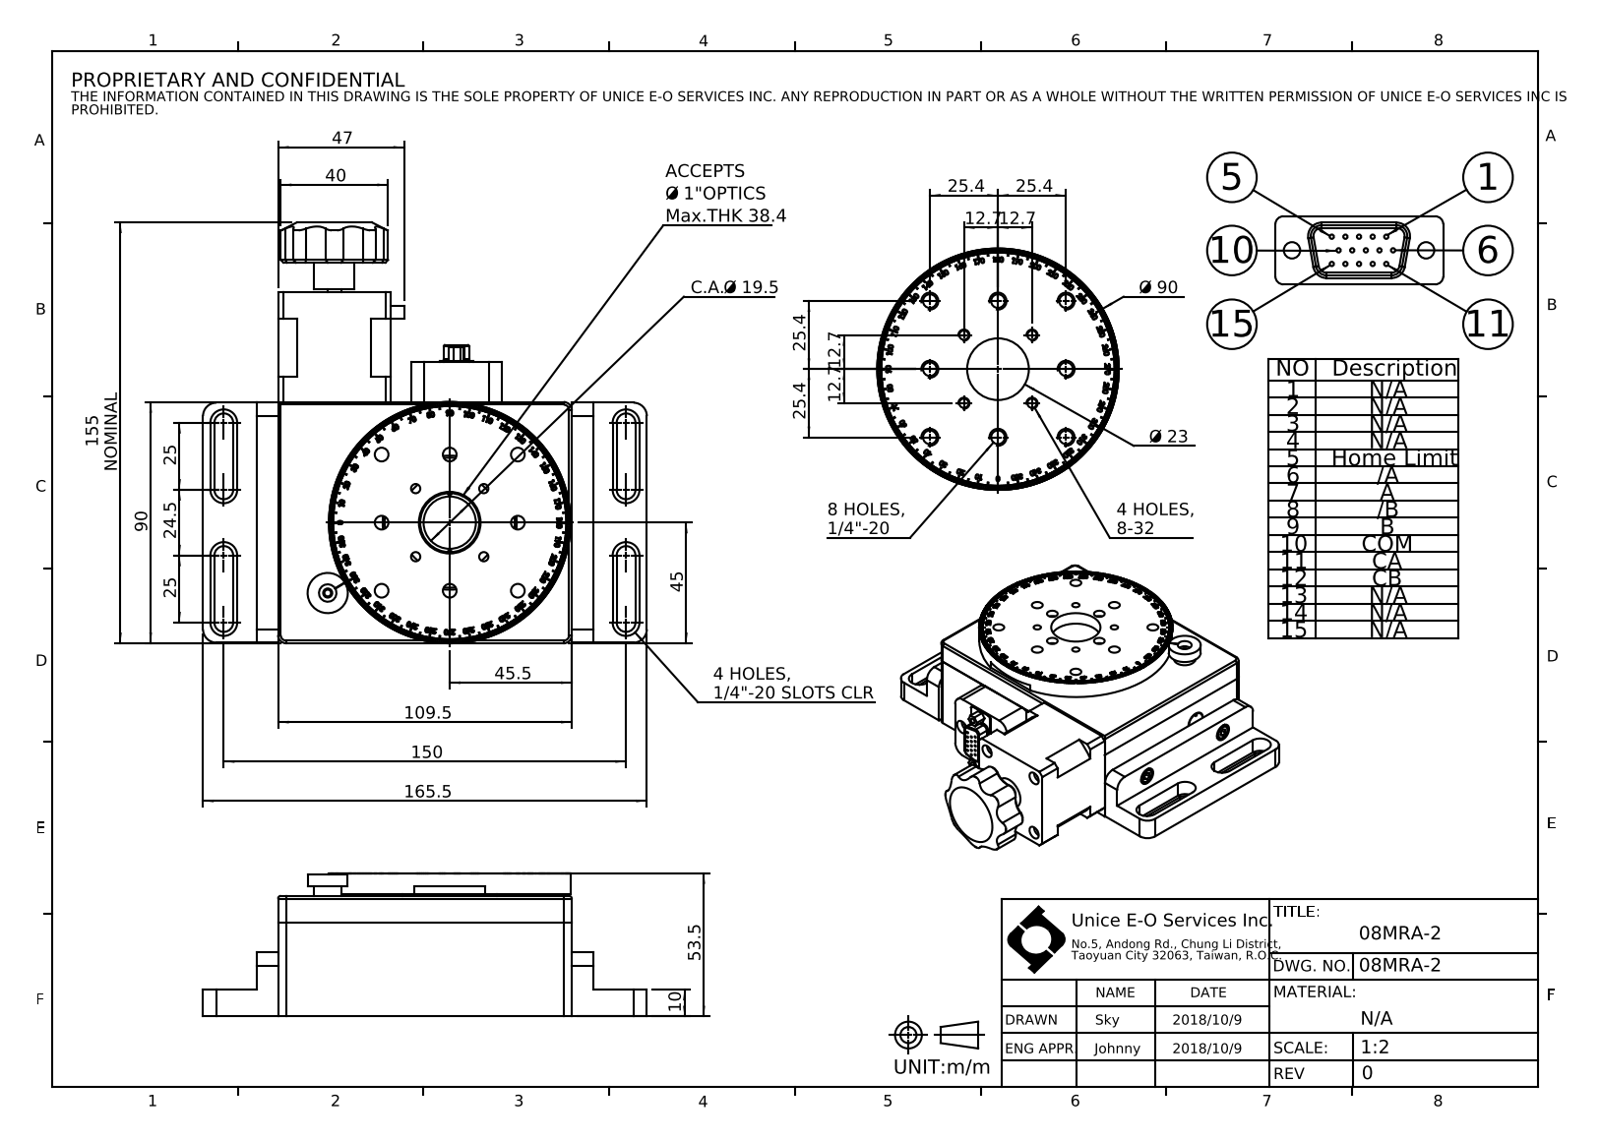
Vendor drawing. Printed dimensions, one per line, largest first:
165.5
155 NOMINAL
150
109.5
90
Ø 90
53.5
47
45.5
45
40
25.4
25.4
25.4
25.4
25
25
24.5
Ø 23
C.A. Ø 19.5
12.7
12.7
12.7
12.7
10
8 HOLES, 1/4"-20
4 HOLES, 8-32
1/4"-20 SLOTS CLR 4 HOLES,
